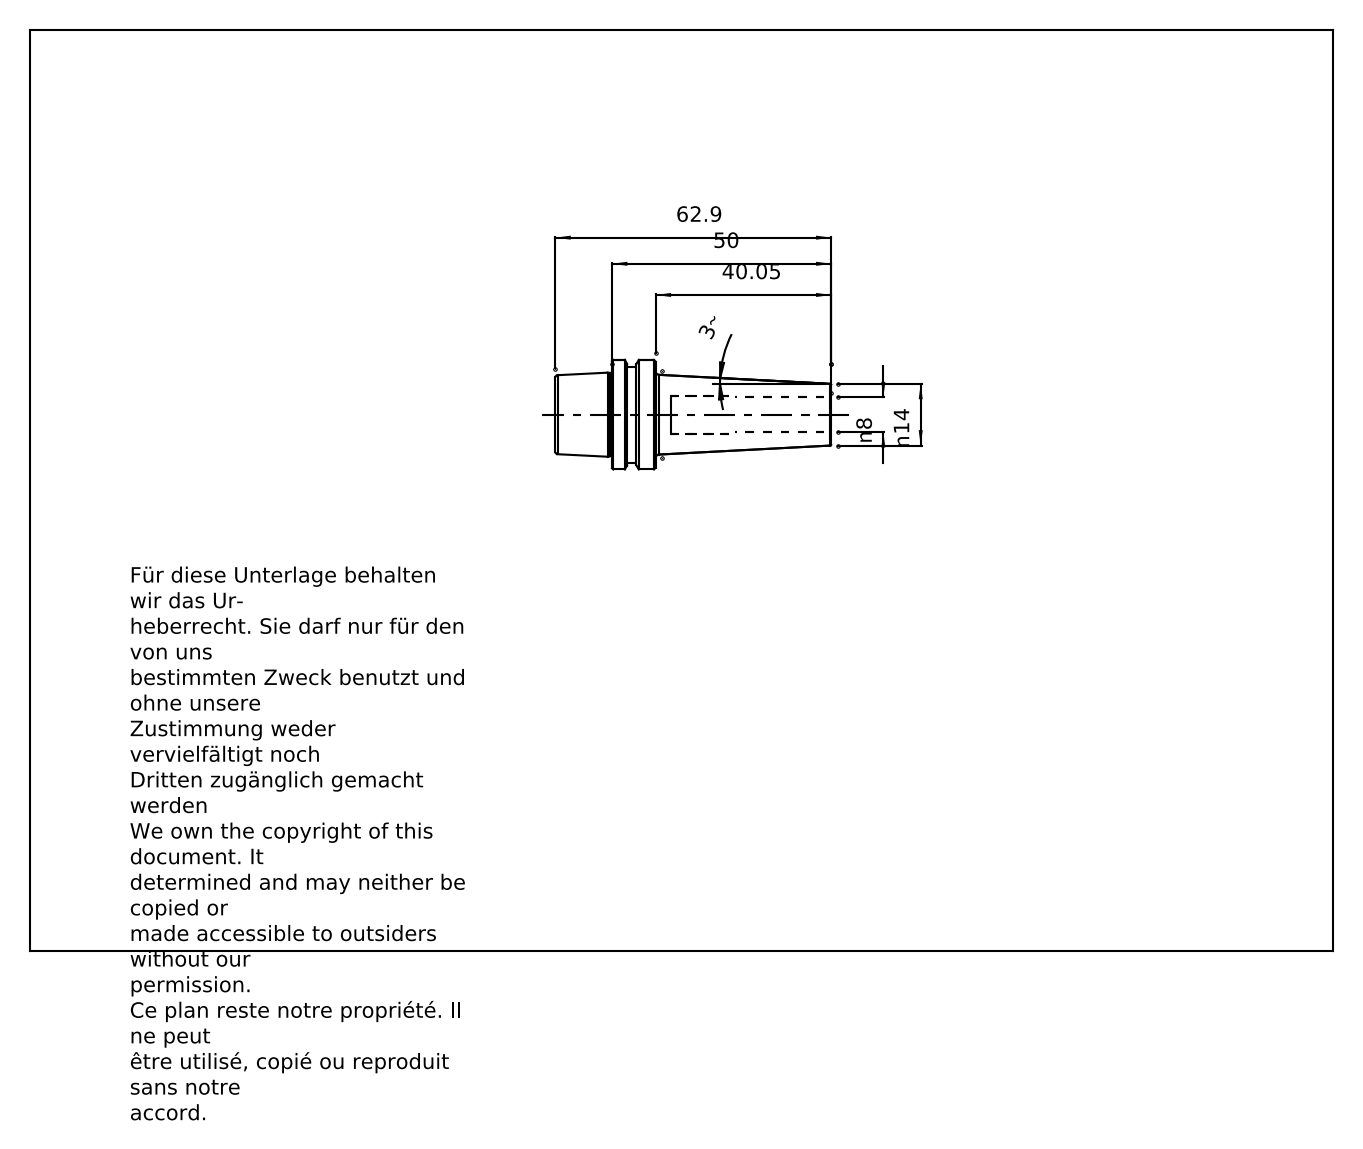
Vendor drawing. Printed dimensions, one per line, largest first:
62.9
50
40.05
n14
n8
